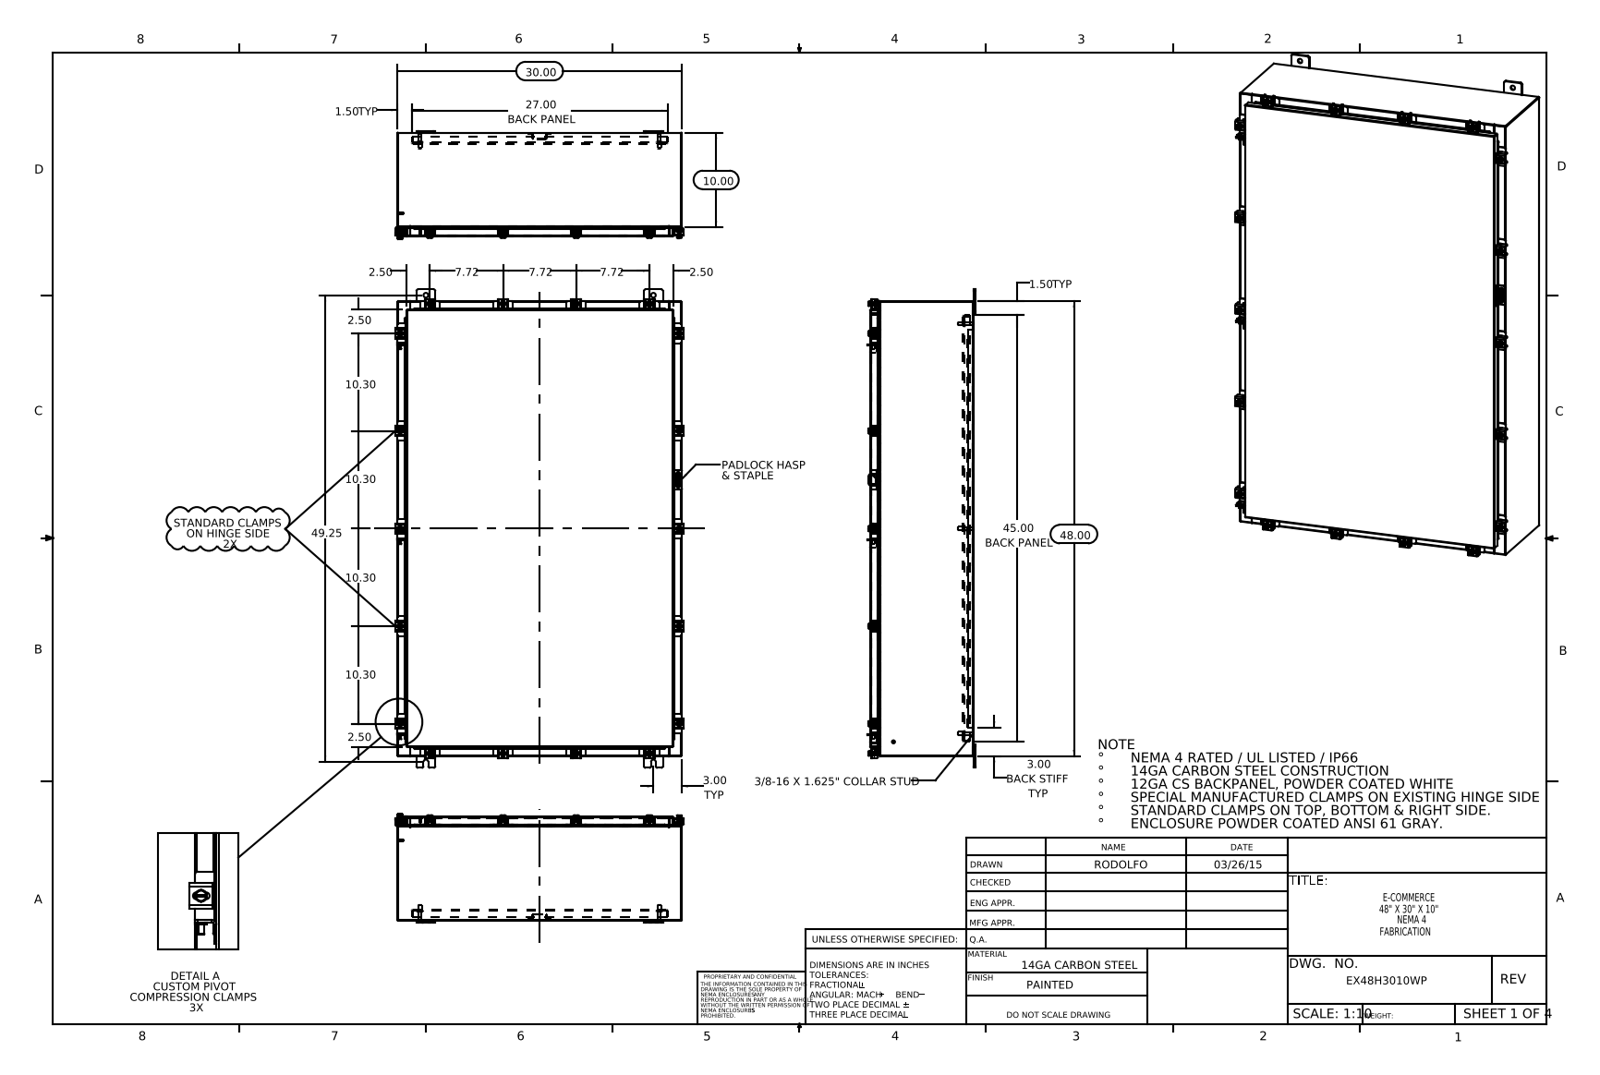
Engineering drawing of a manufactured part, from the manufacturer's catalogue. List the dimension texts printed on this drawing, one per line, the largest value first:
49.25
48.00
45.00 BACK PANEL
30.00
27.00 BACK PANEL
10.30
10.30
10.30
10.30
10.00
7.72
7.72
7.72
3.00 TYP
3.00 BACK STIFF TYP
2.50
2.50
2.50
2.50
1.50 TYP
1.50 TYP
